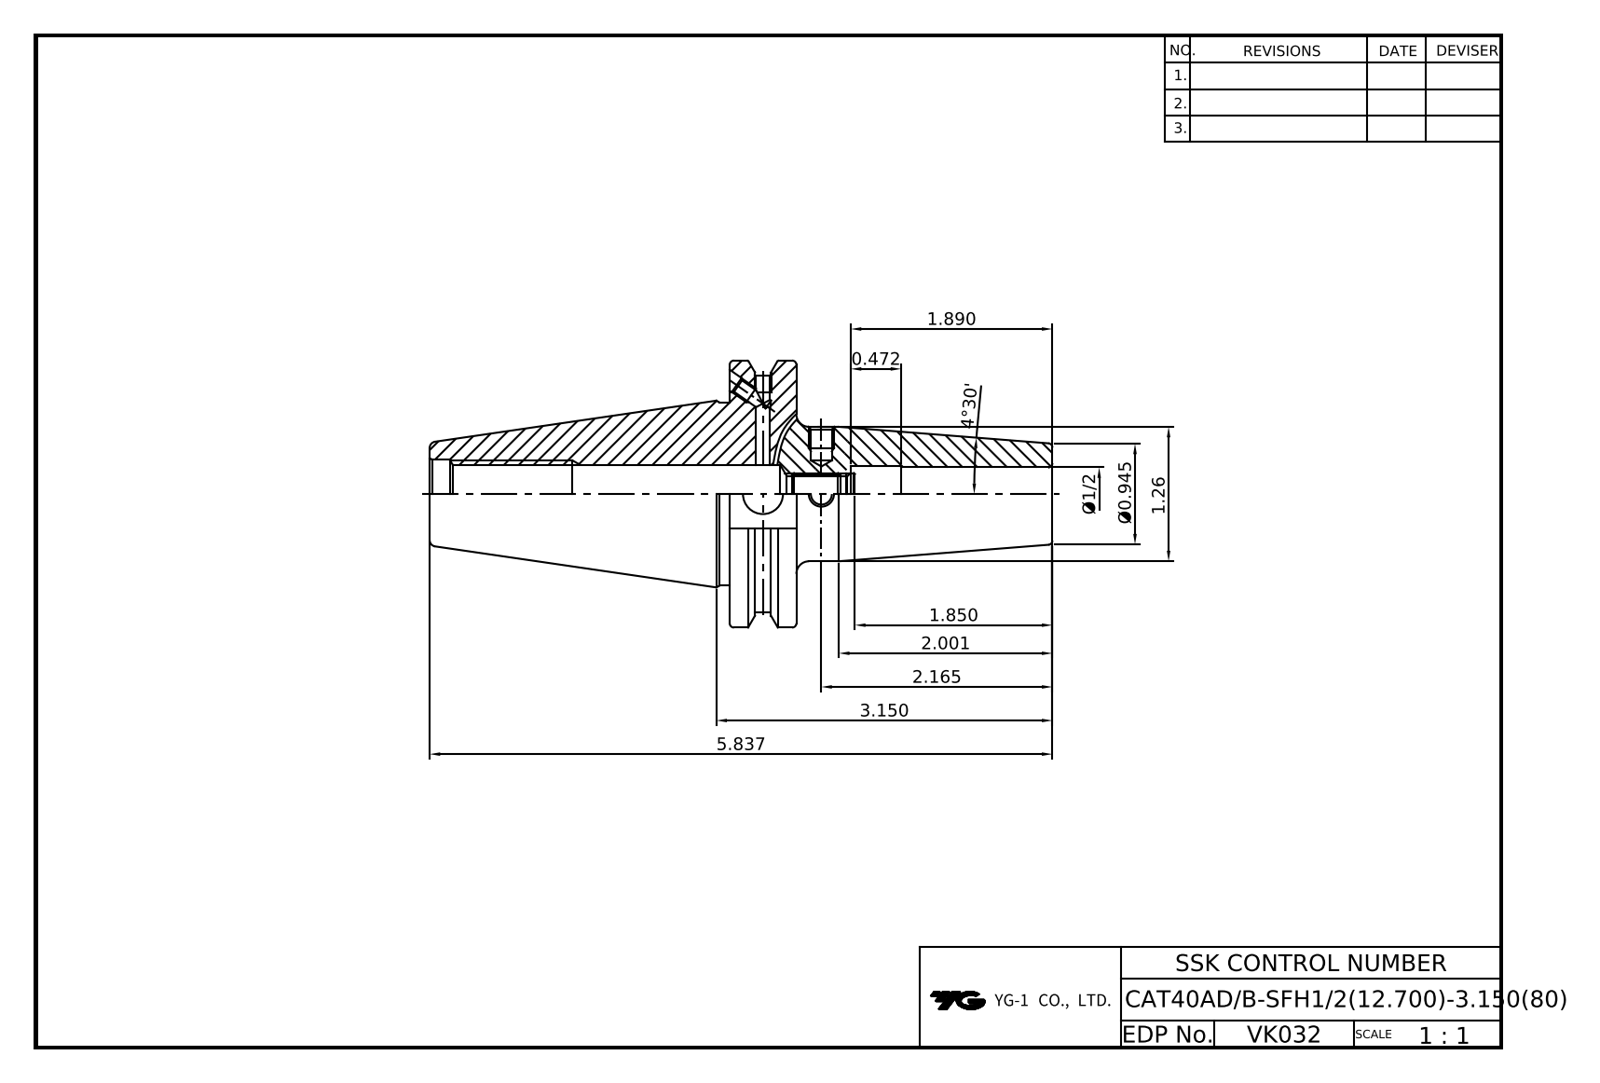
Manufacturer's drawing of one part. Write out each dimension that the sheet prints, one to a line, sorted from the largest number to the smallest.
5.837
4°30'
3.150
2.165
2.001
1.890
1.850
1.26
Ø0.945
0.472
